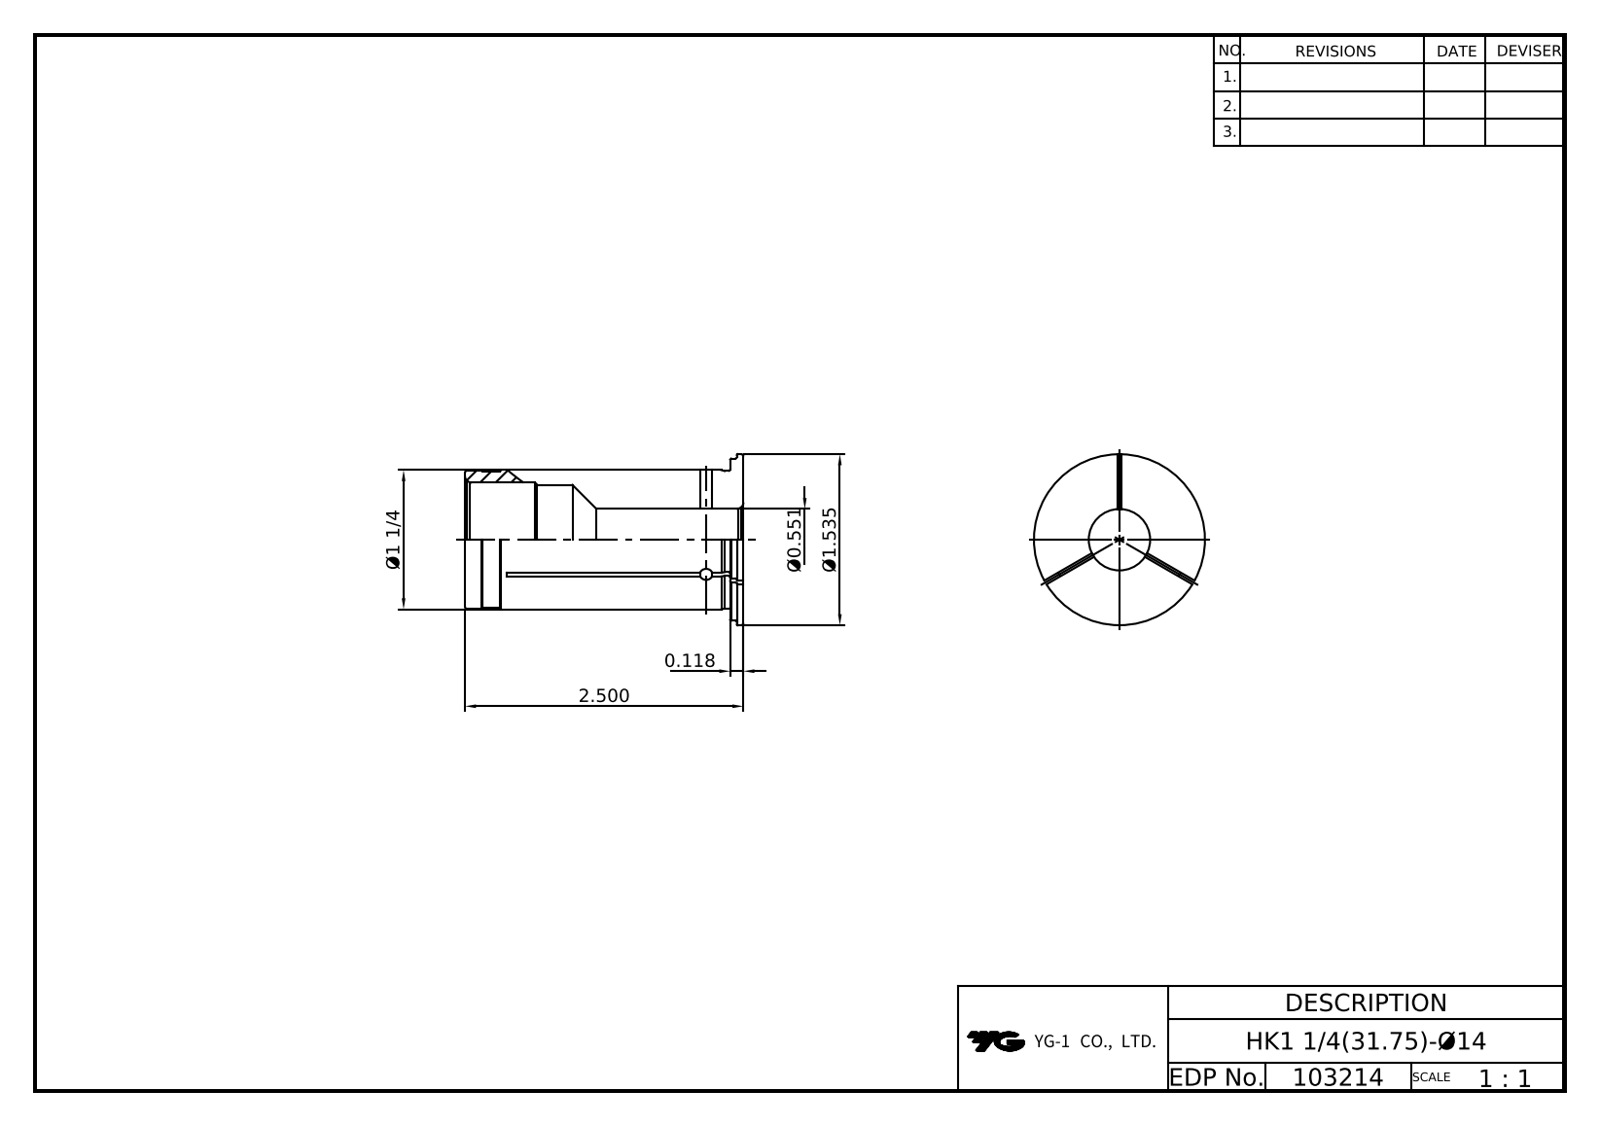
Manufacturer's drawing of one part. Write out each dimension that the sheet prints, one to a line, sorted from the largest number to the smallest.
2.500
Ø1.535
Ø1 1/4
0.118
